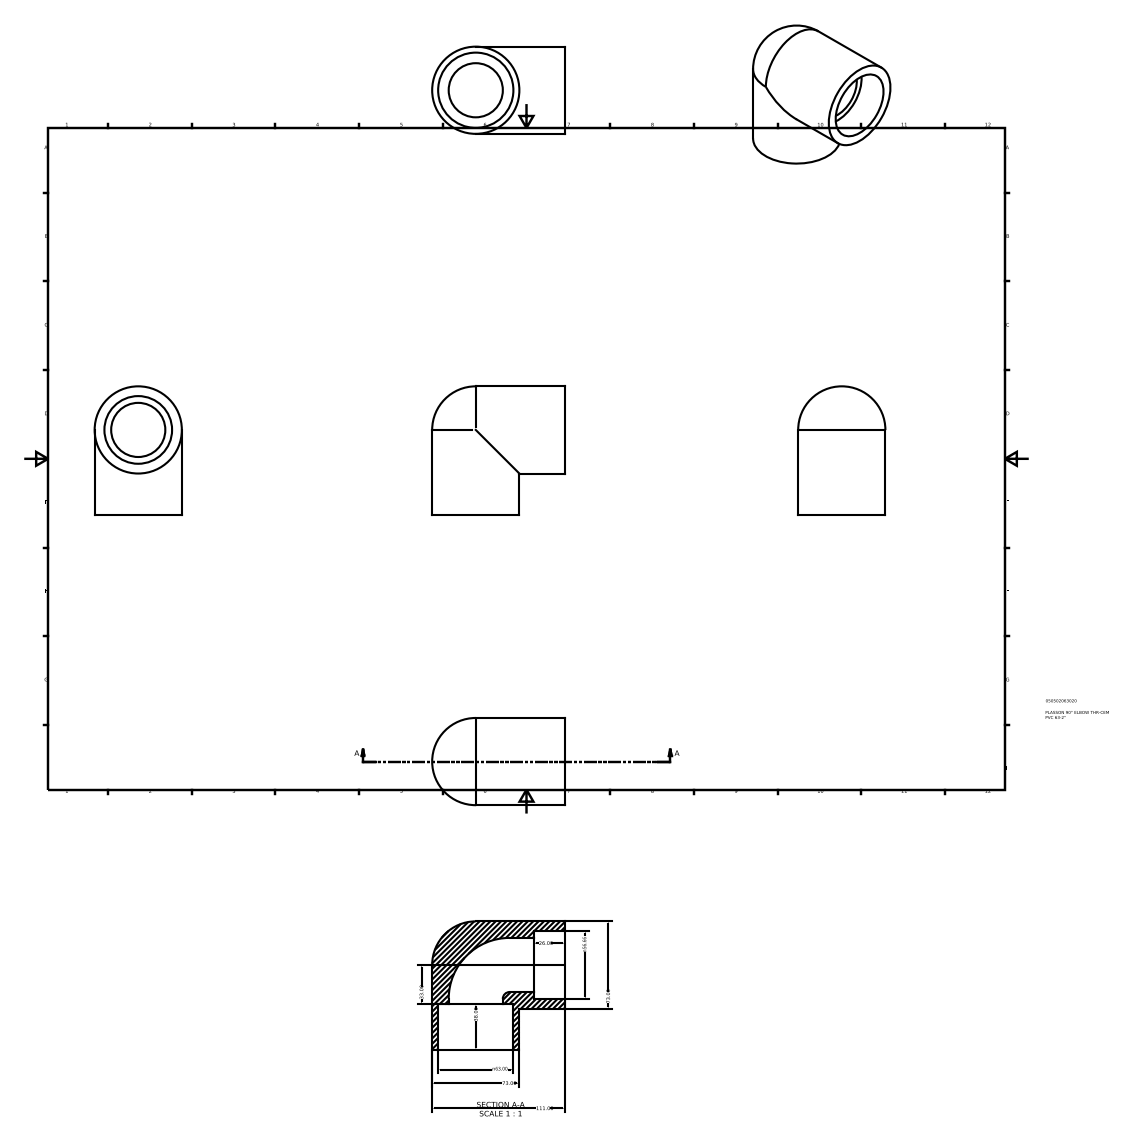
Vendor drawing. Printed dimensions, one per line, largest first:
111.00
73.00
73.00
n63.00
n56.66
38.00
33.00
26.00
